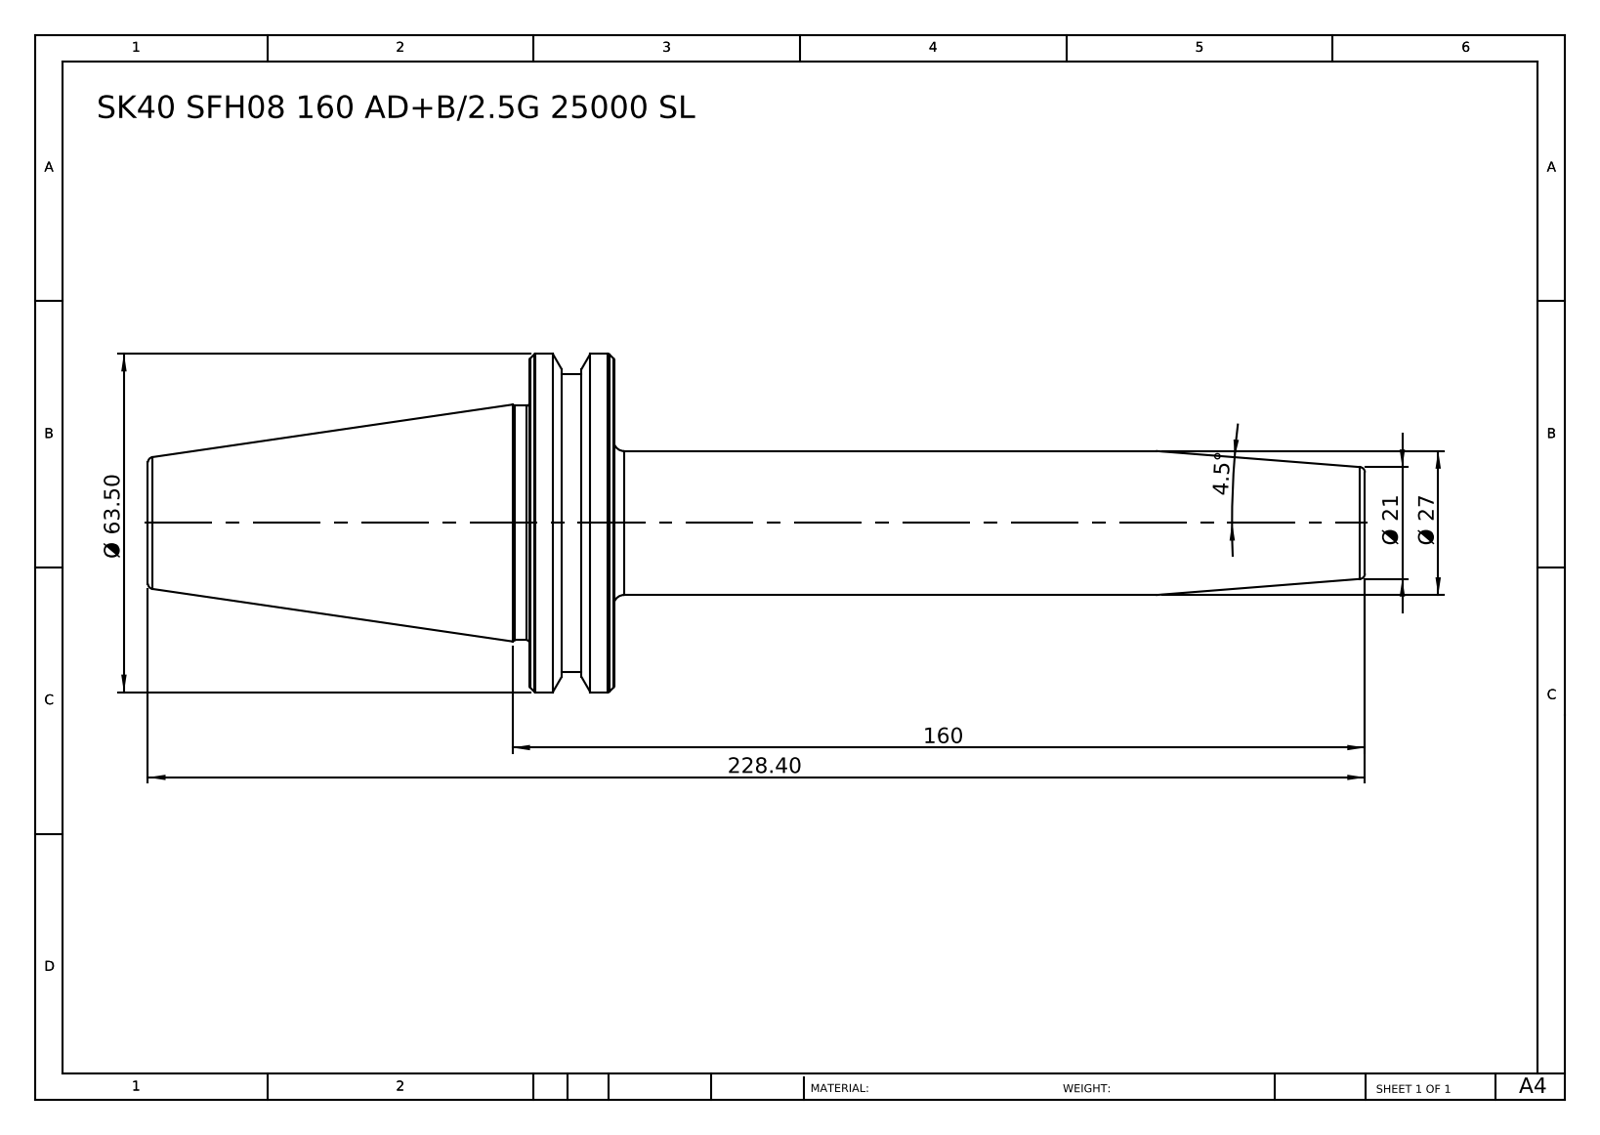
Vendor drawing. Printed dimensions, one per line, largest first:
228.40
160
Ø 63.50
Ø 27
Ø 21
4.5°
